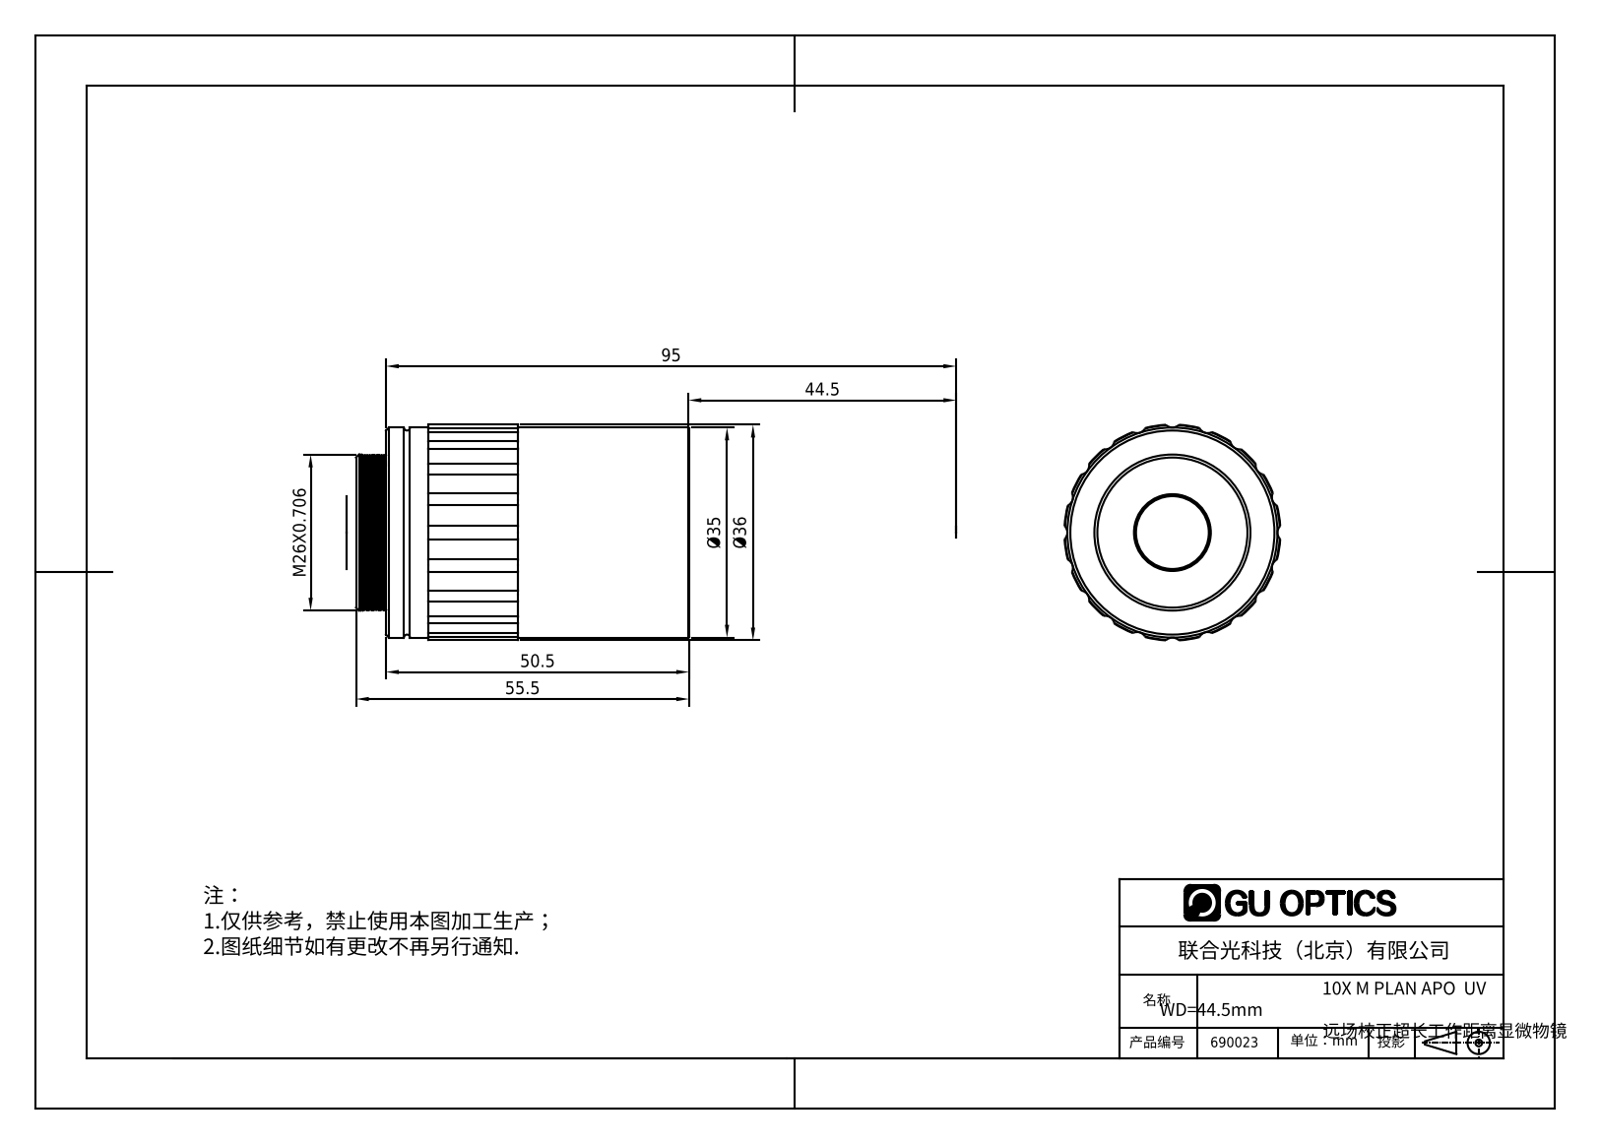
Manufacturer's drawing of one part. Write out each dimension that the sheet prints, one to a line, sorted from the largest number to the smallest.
95
55.5
50.5
44.5
Ø36
Ø35
M26X0.706
